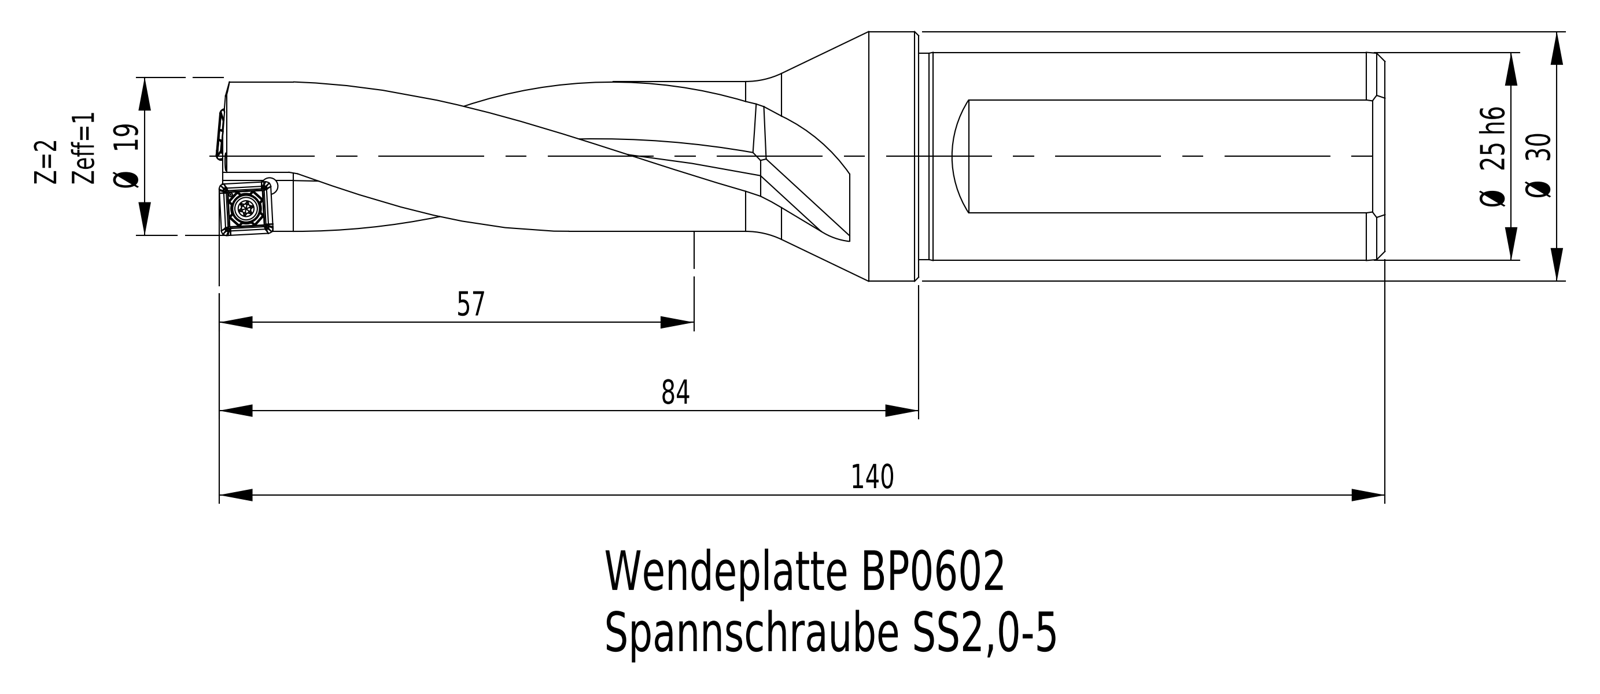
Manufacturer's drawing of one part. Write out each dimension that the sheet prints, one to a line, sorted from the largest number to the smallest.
140
84
57
Ø 30
Ø 25 h6
Ø 19
